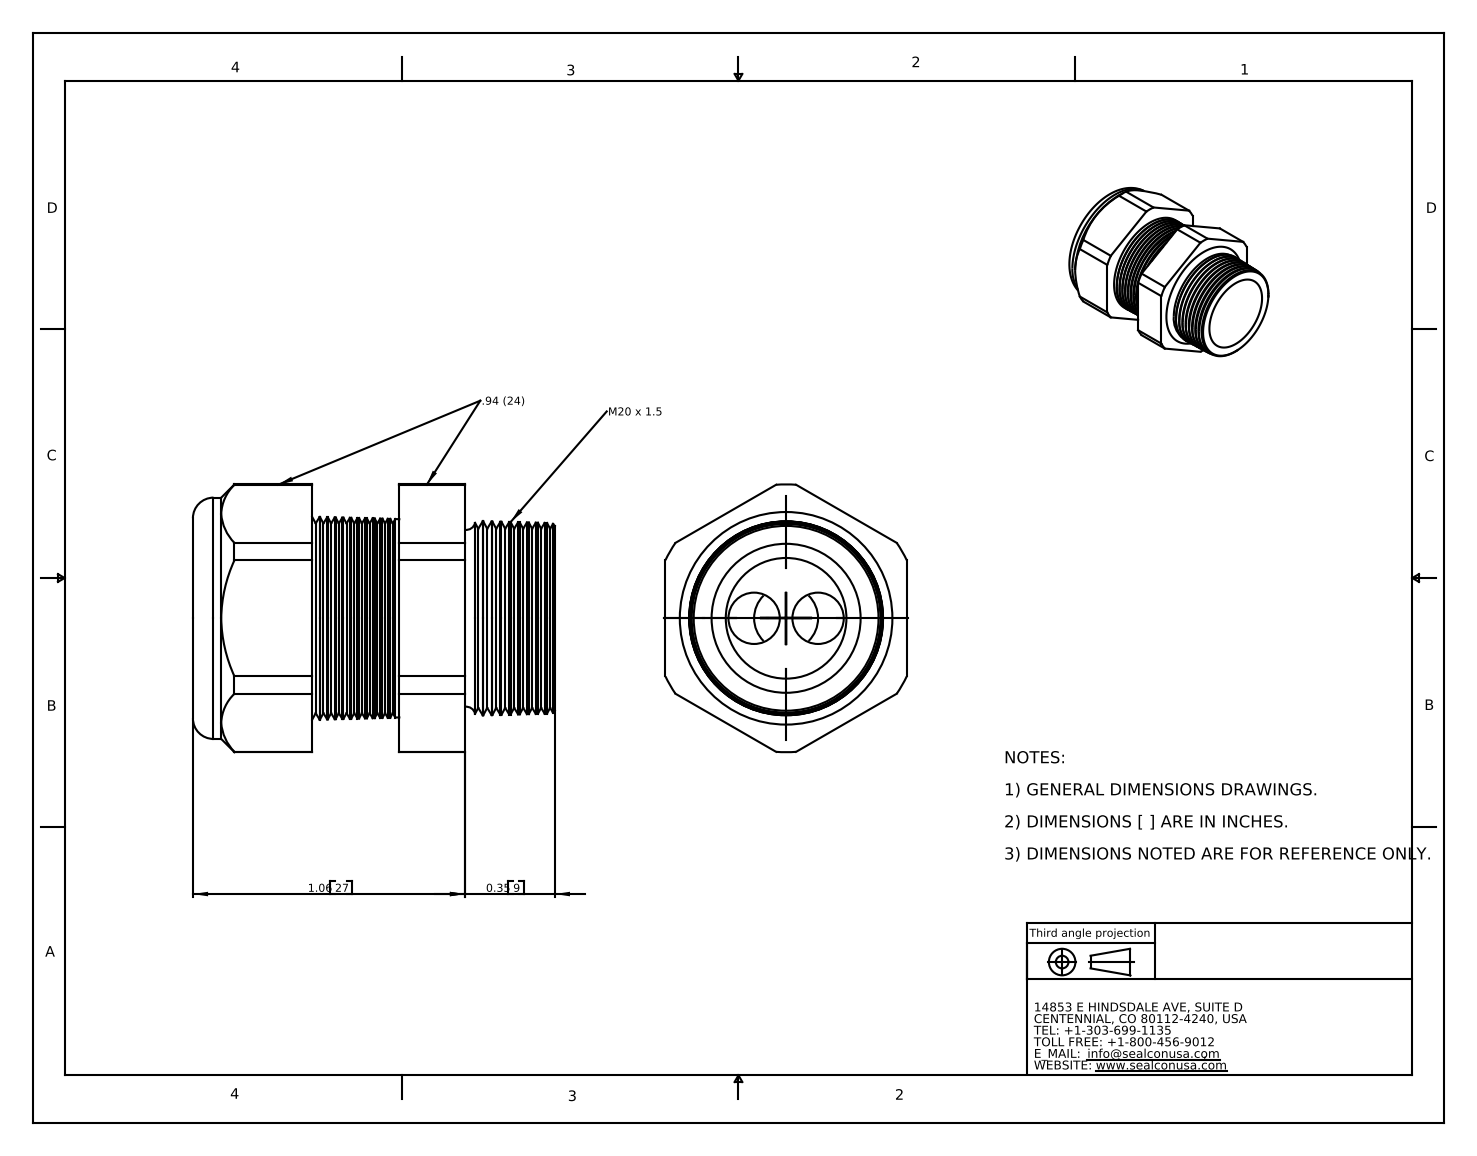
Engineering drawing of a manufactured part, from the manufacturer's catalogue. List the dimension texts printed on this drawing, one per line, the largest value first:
1.06 27
0.35 9
